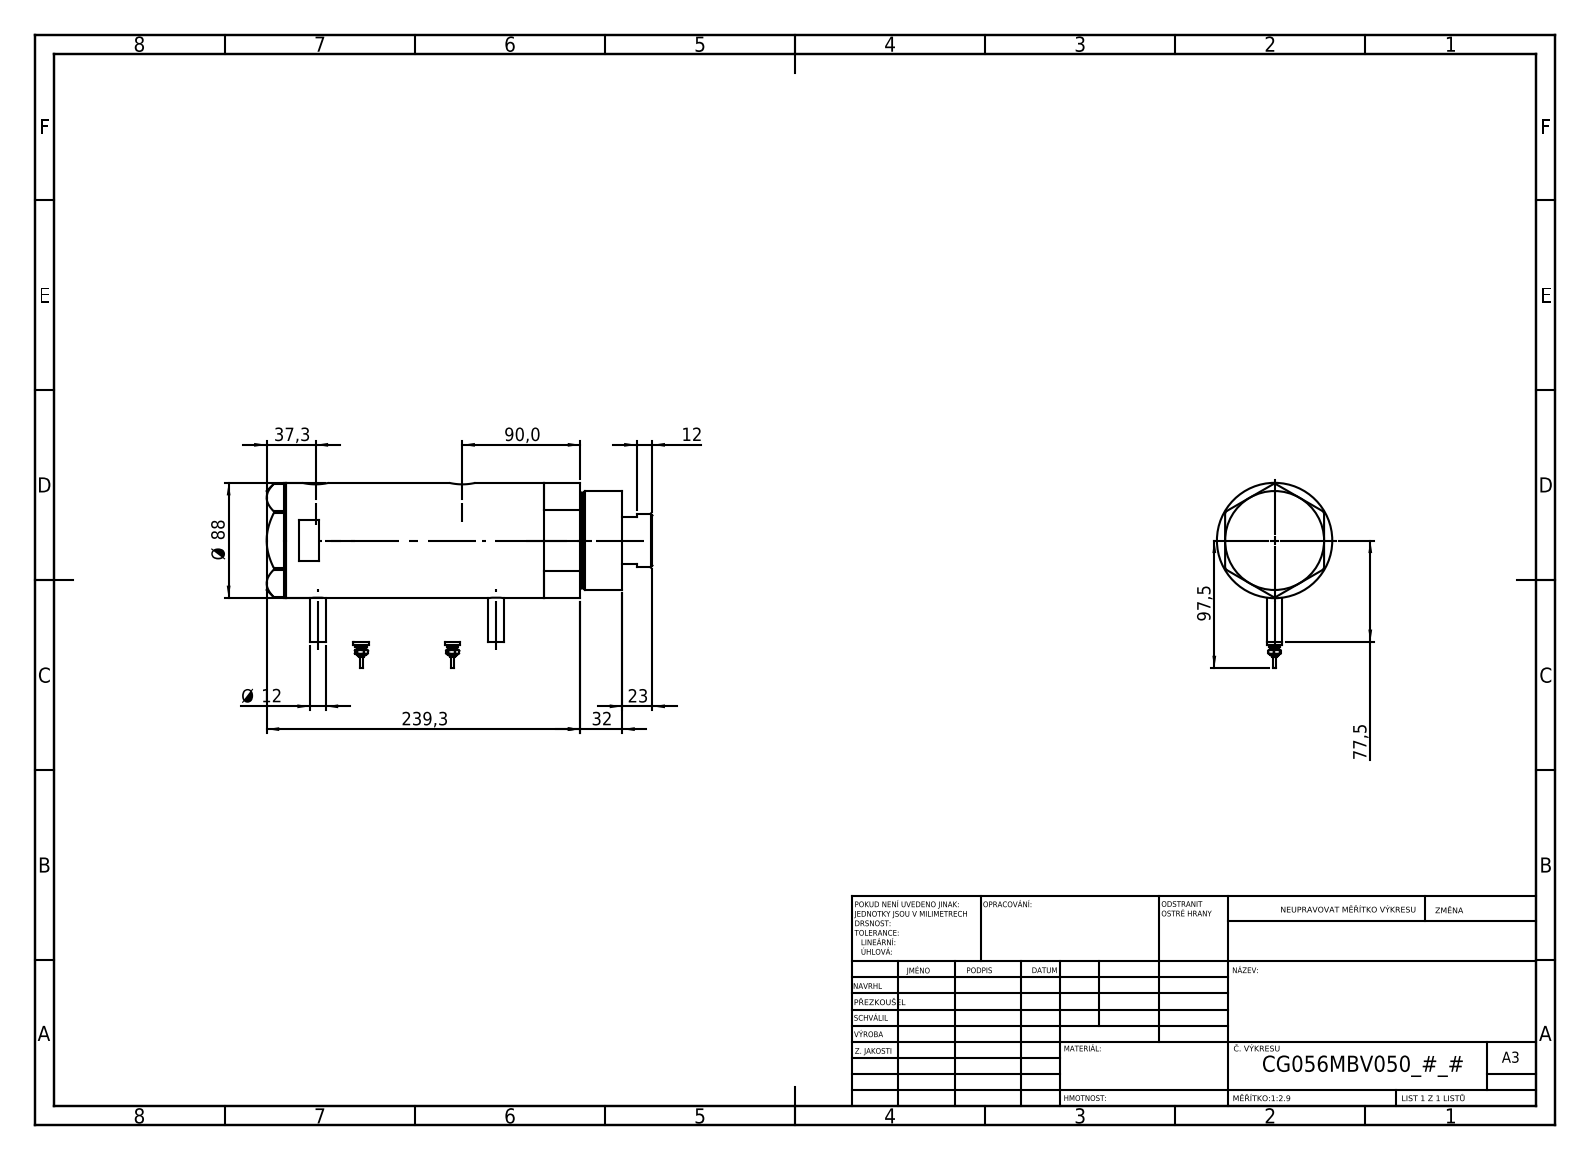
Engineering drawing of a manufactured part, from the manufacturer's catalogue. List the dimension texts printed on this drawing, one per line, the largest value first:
239,3
97,5
90,0
Ø 88
77,5
37,3
32
23
12
Ø 12
